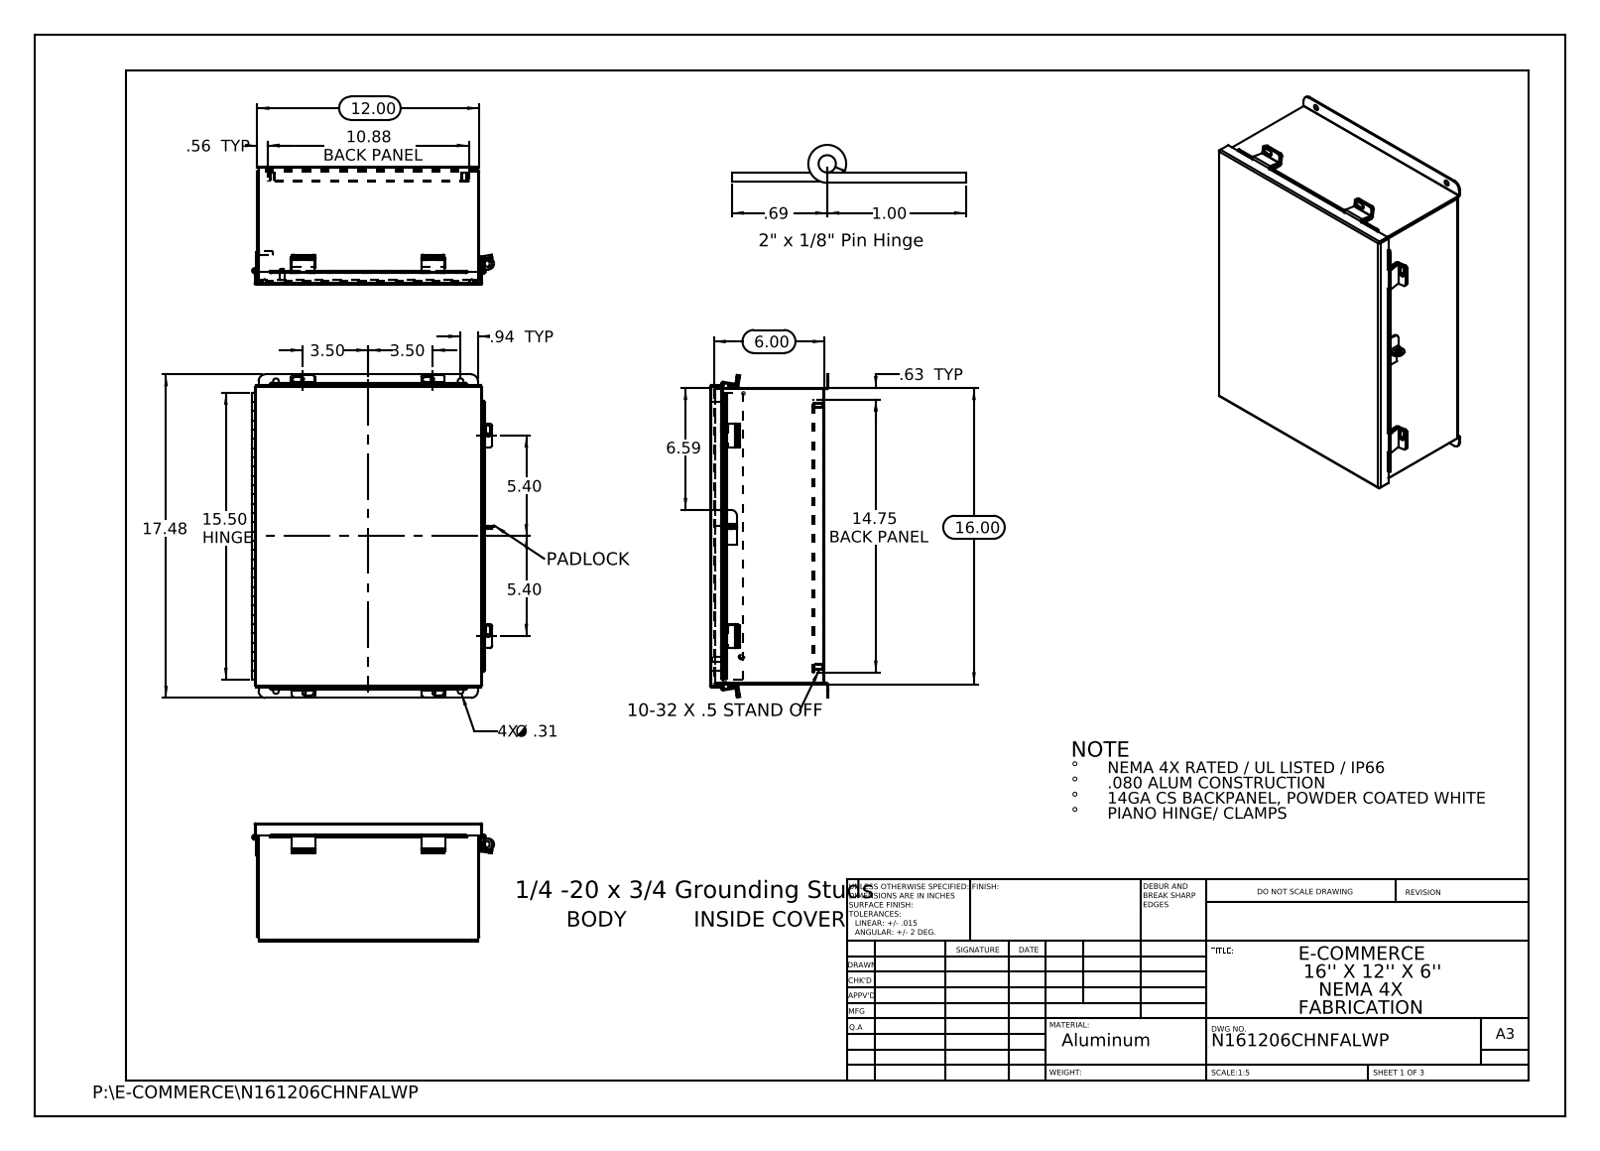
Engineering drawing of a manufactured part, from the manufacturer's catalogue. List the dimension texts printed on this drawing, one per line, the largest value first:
17.48
16.00
15.50 HINGE
14.75 BACK PANEL
12.00
10.88 BACK PANEL
6.59
6.00
5.40
5.40
3.50
3.50
1.00
.94 TYP
.69
.63 TYP
.56 TYP
4X Ø .31
